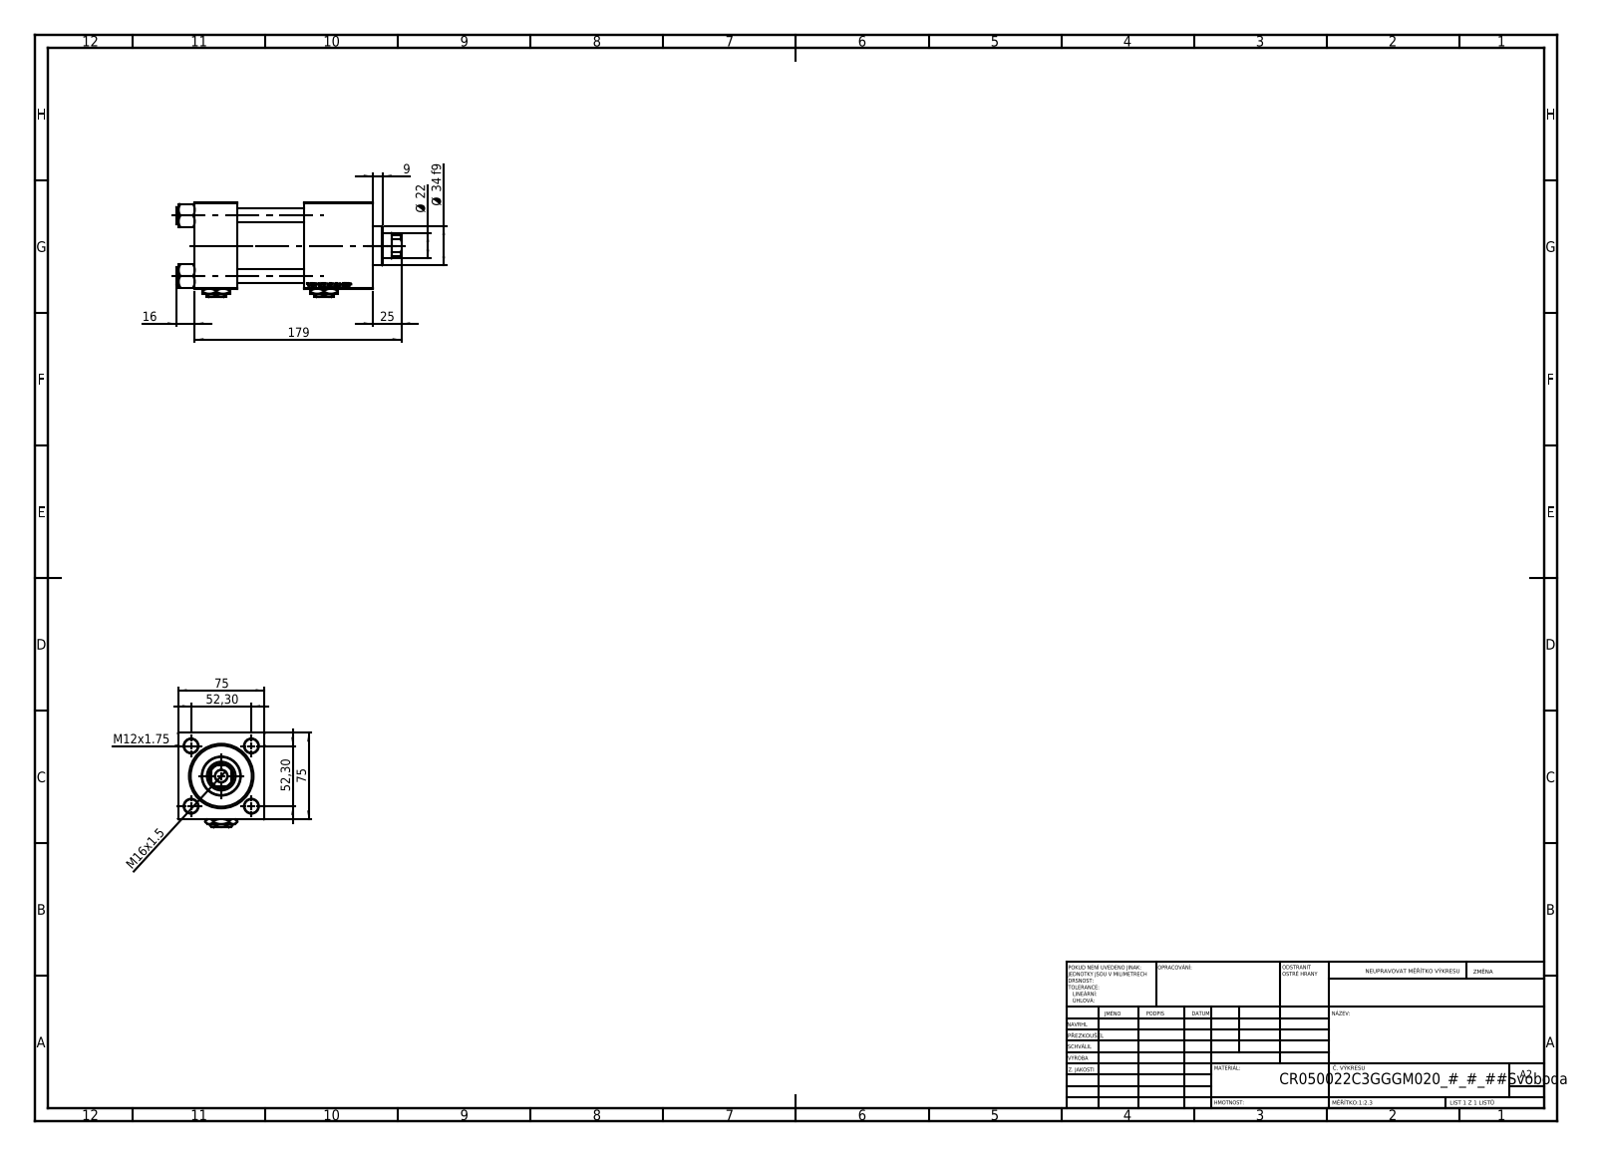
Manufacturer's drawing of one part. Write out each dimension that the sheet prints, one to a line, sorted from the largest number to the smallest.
179
75
75
52,30
52,30
Ø 34 f9
25
Ø 22
16
M16x1.5
M12x1.75
9
